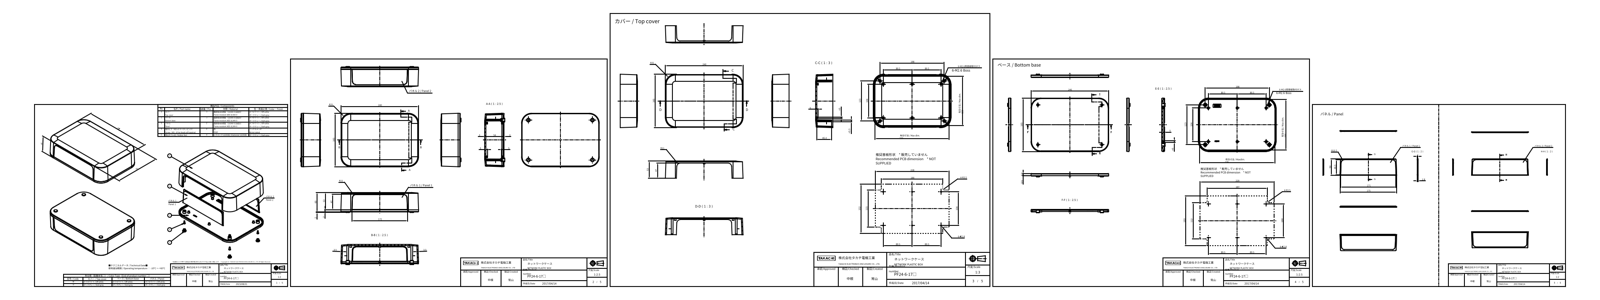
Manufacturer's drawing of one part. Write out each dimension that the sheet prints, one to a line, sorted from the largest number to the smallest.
240
240
240
240
有効寸法 / Max dim. 229
有効寸法 / Maxdim. 229
229
228
198
198
190
187
175
172
171
165
165
165
165
有効寸法 / Max dim. 153
有効寸法 / Max dim. 153
153
152
123
123
115
112
104
104
104
104
89.5
89.5
89.5
89.5
89.5
89.5
89.5
89.5
60
60
54
53
53
50
47
47
46.5
46.4
R31
R31
R11
R11
R10.5
7
6.5
n5.3
5
5
5
n5
5
n5
3.5
3.5
4-R3.5
4-R3.5
3
3
6-∅2.8
6-∅2.8
2.8
6-M2.6用基板取付ボス
6-M2.6用基板取付ボス
2
2
0.5
